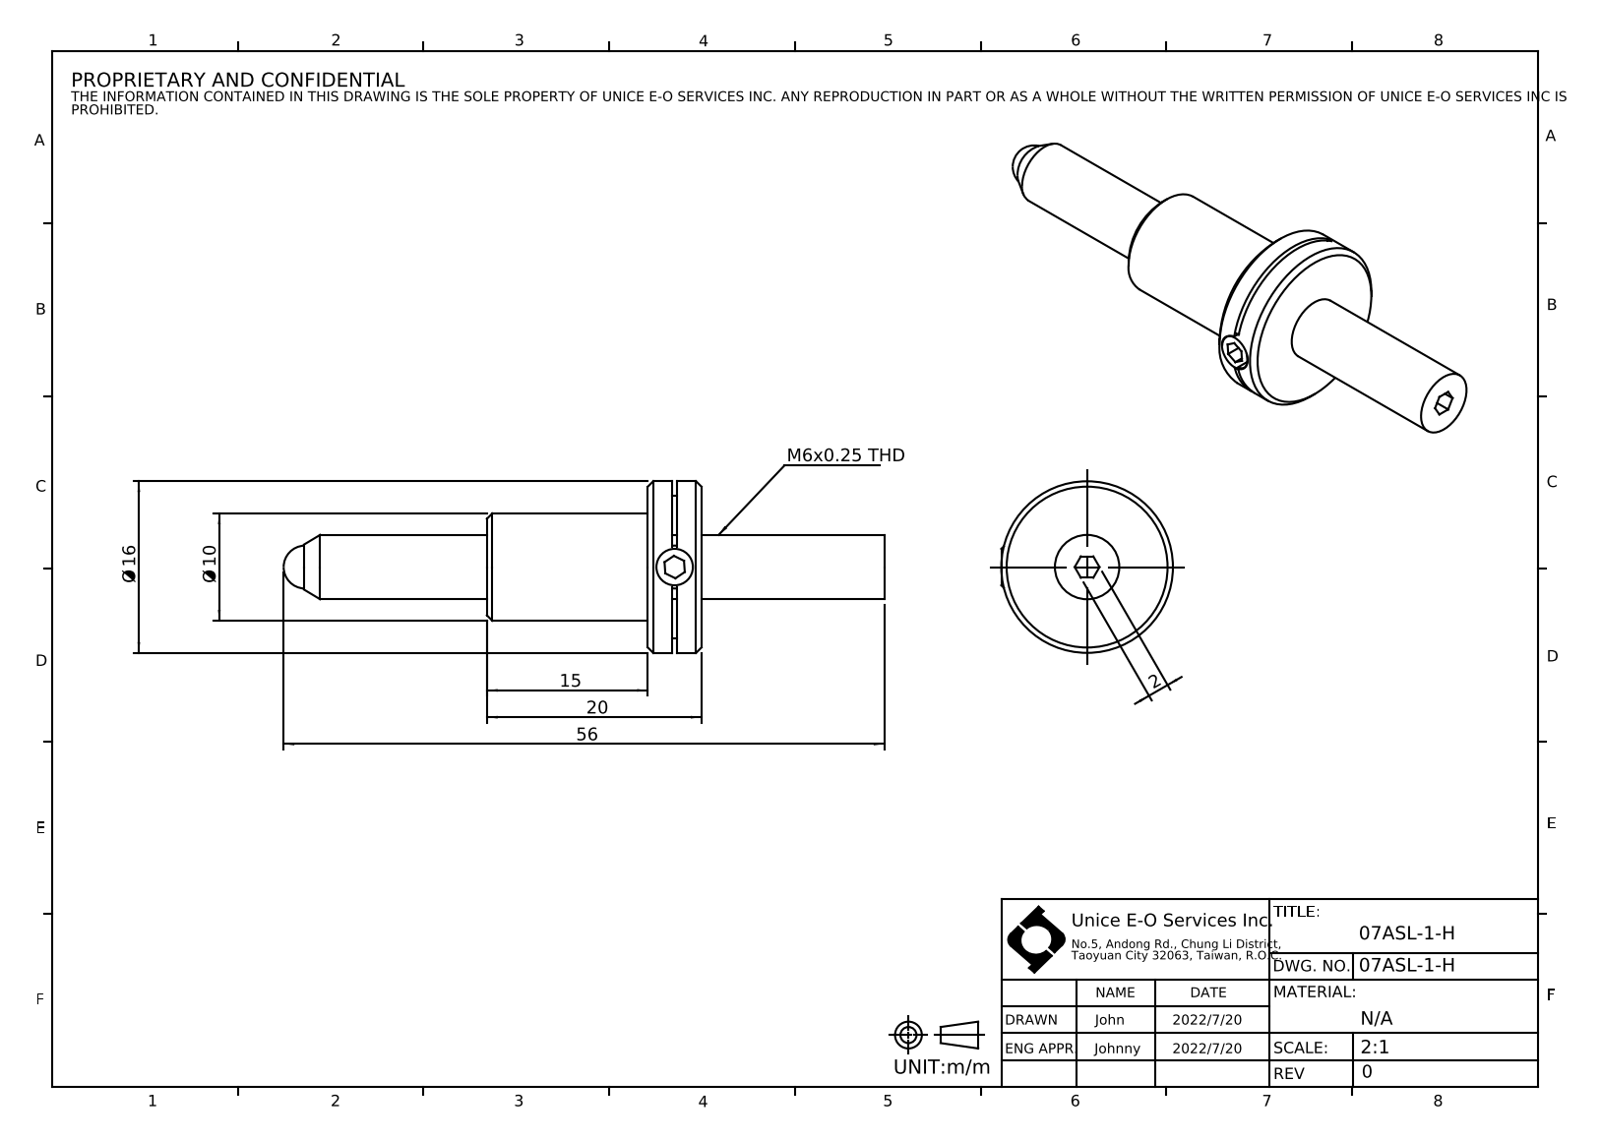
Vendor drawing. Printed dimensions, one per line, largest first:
56
20
Ø 16
15
Ø 10
2
